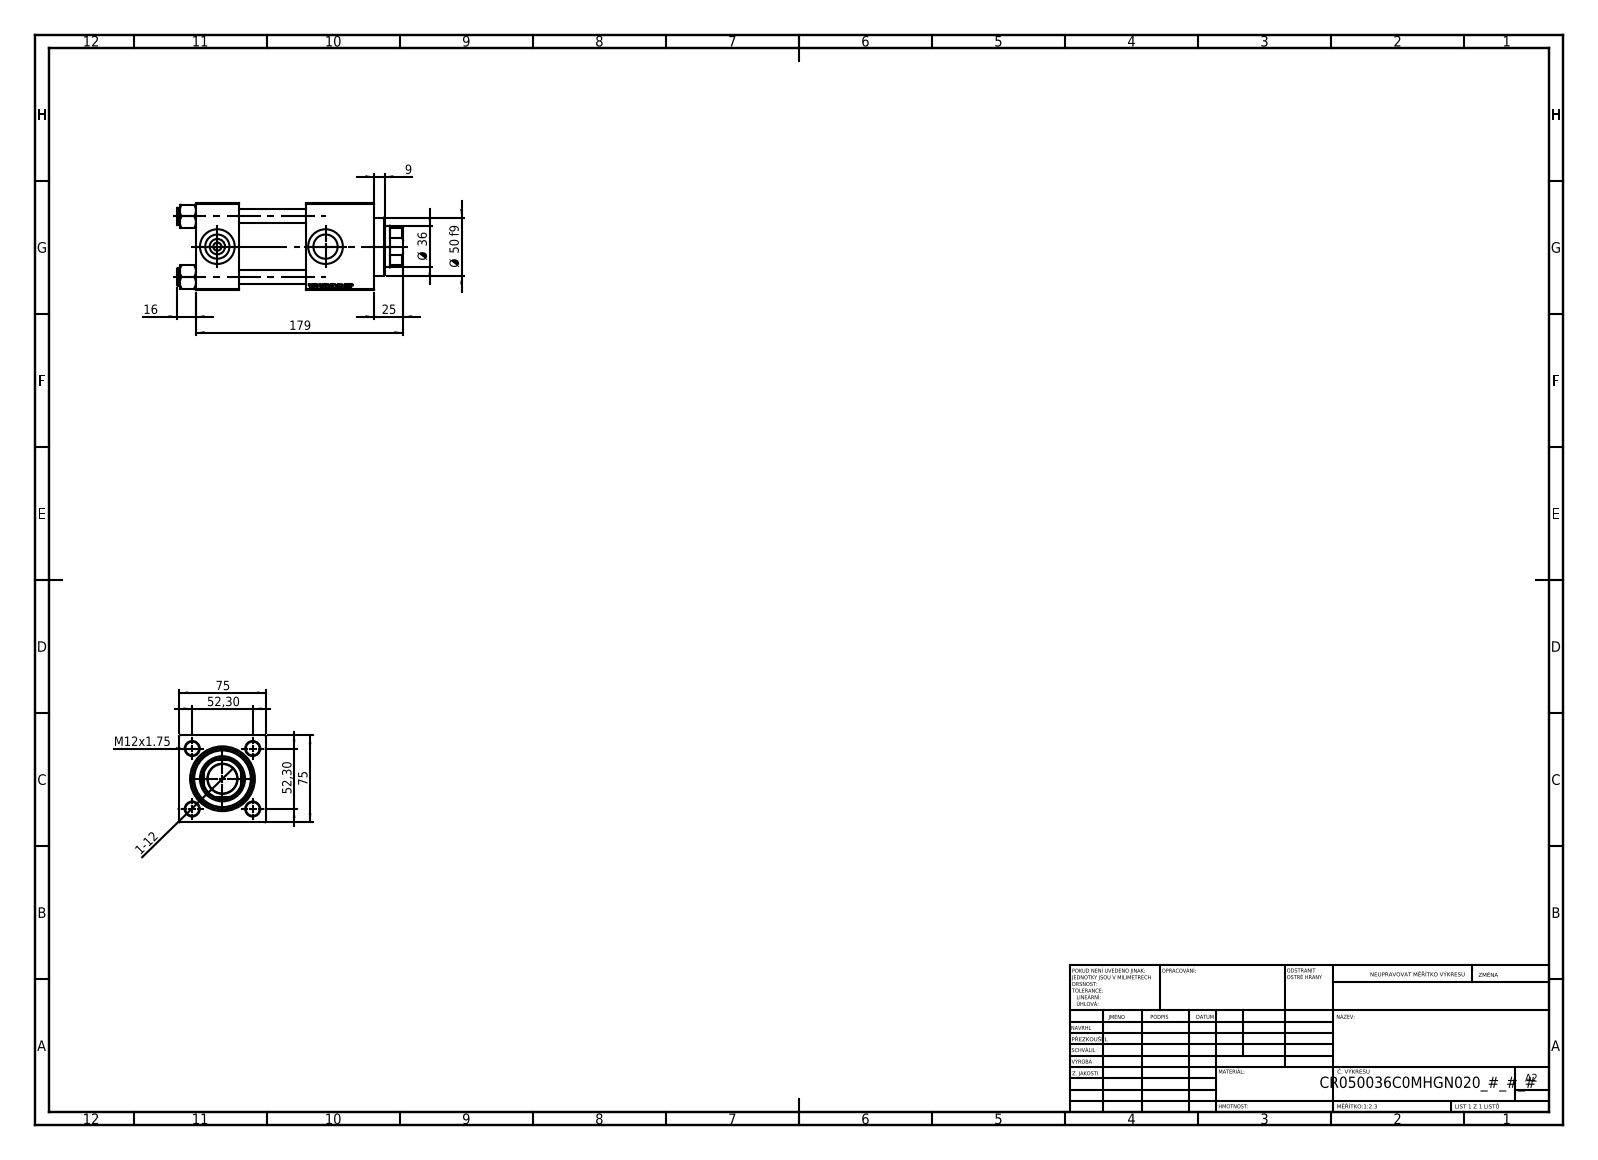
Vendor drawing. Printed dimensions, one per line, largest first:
179
75
75
52,30
52,30
Ø 50 f9
Ø 36
25
16
M12x1.75
9
1-12
